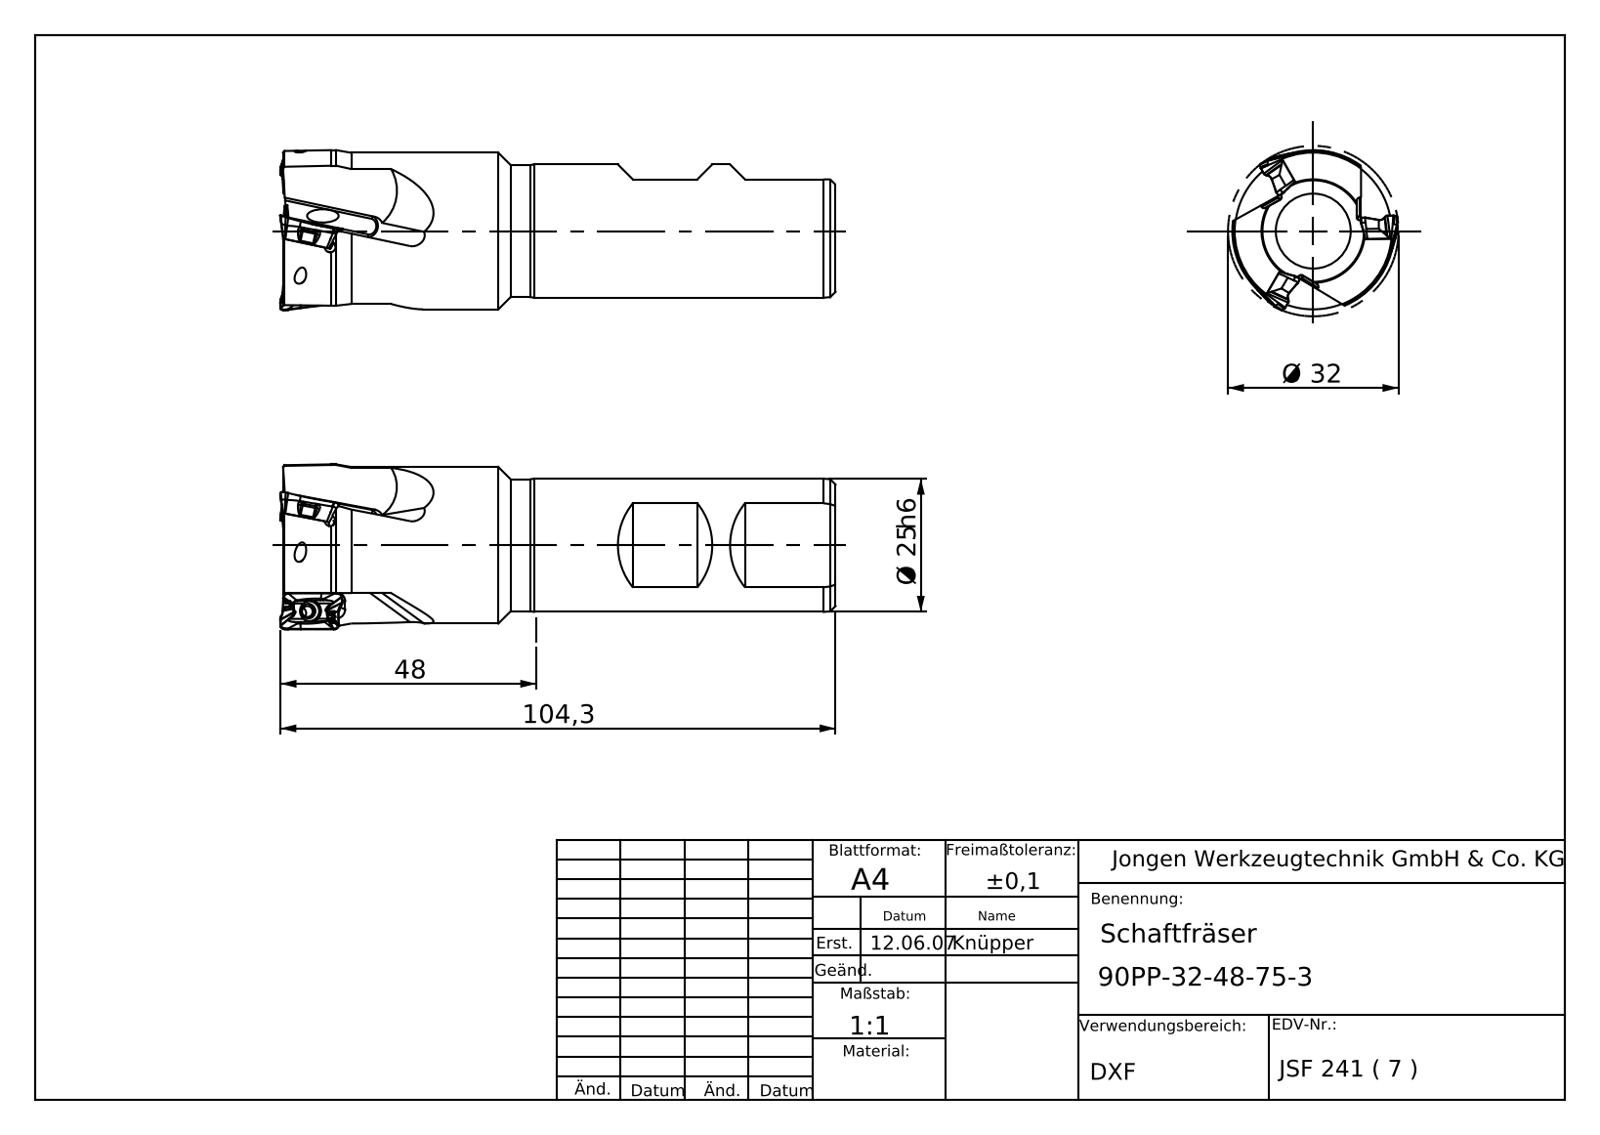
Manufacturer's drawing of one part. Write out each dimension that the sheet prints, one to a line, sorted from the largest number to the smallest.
104,3
48
Ø 32
Ø 25 h6
